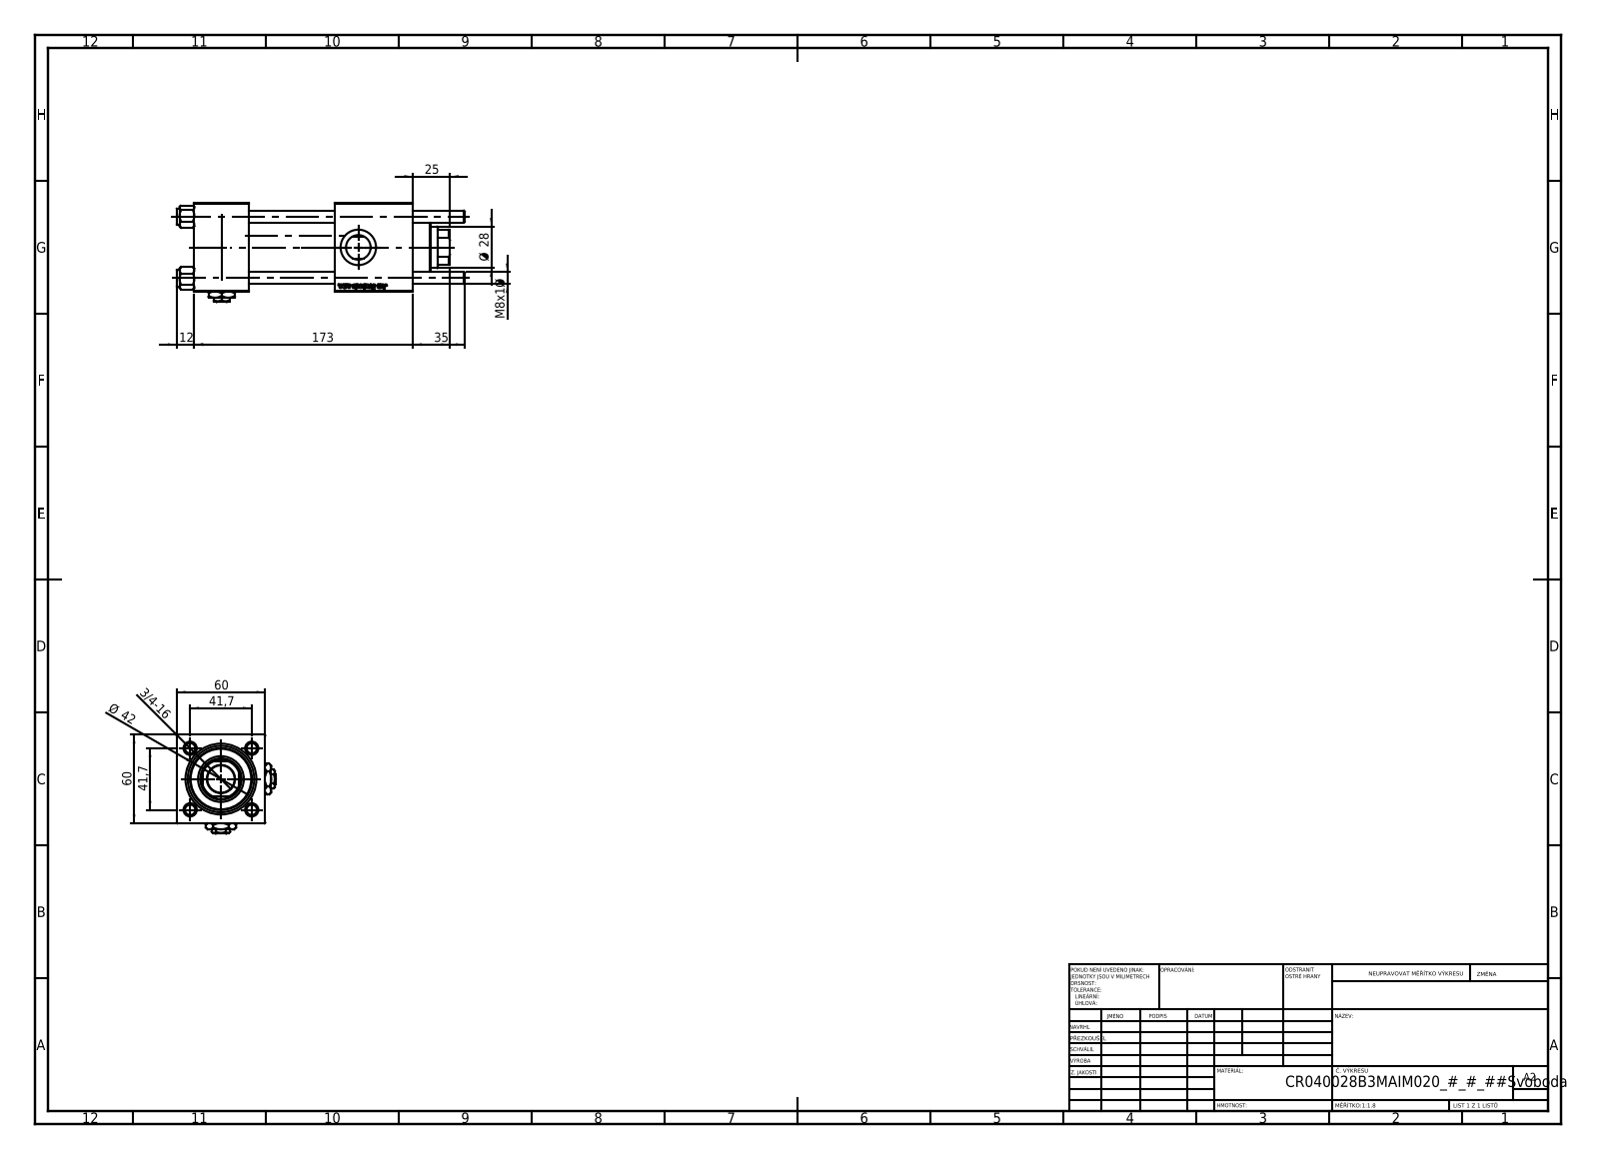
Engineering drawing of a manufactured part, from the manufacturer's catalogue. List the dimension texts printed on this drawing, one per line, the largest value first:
173
60
60
Ø 42
41,7
41,7
35
Ø 28
25
12
M8x1 Ø
3/4-16
